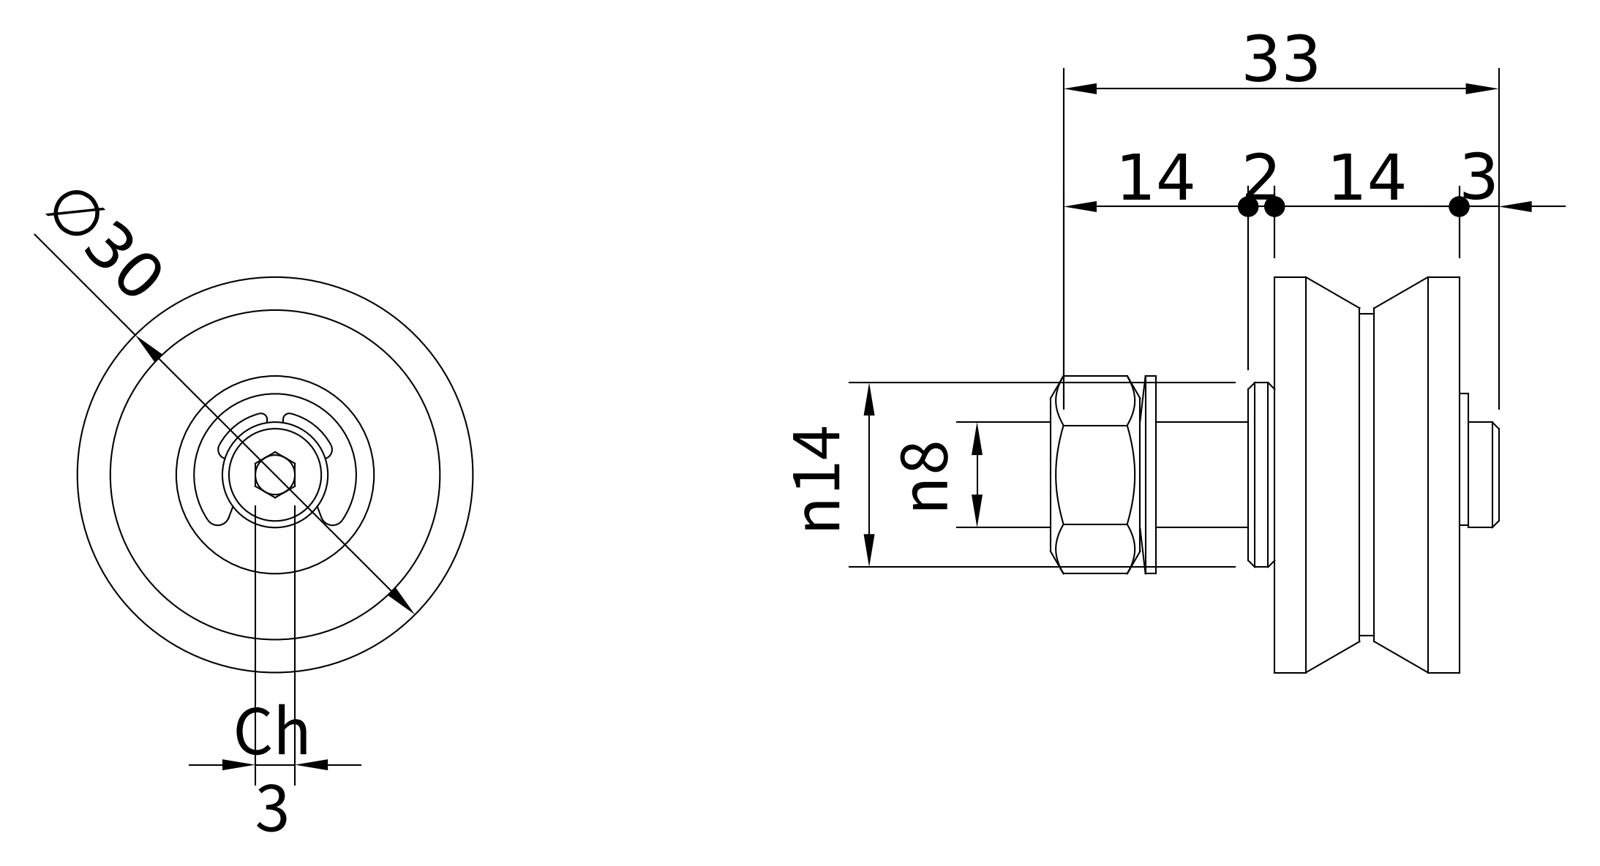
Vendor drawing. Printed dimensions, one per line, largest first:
33
∅30
14
14
n14
n8
3
Ch 3
2
